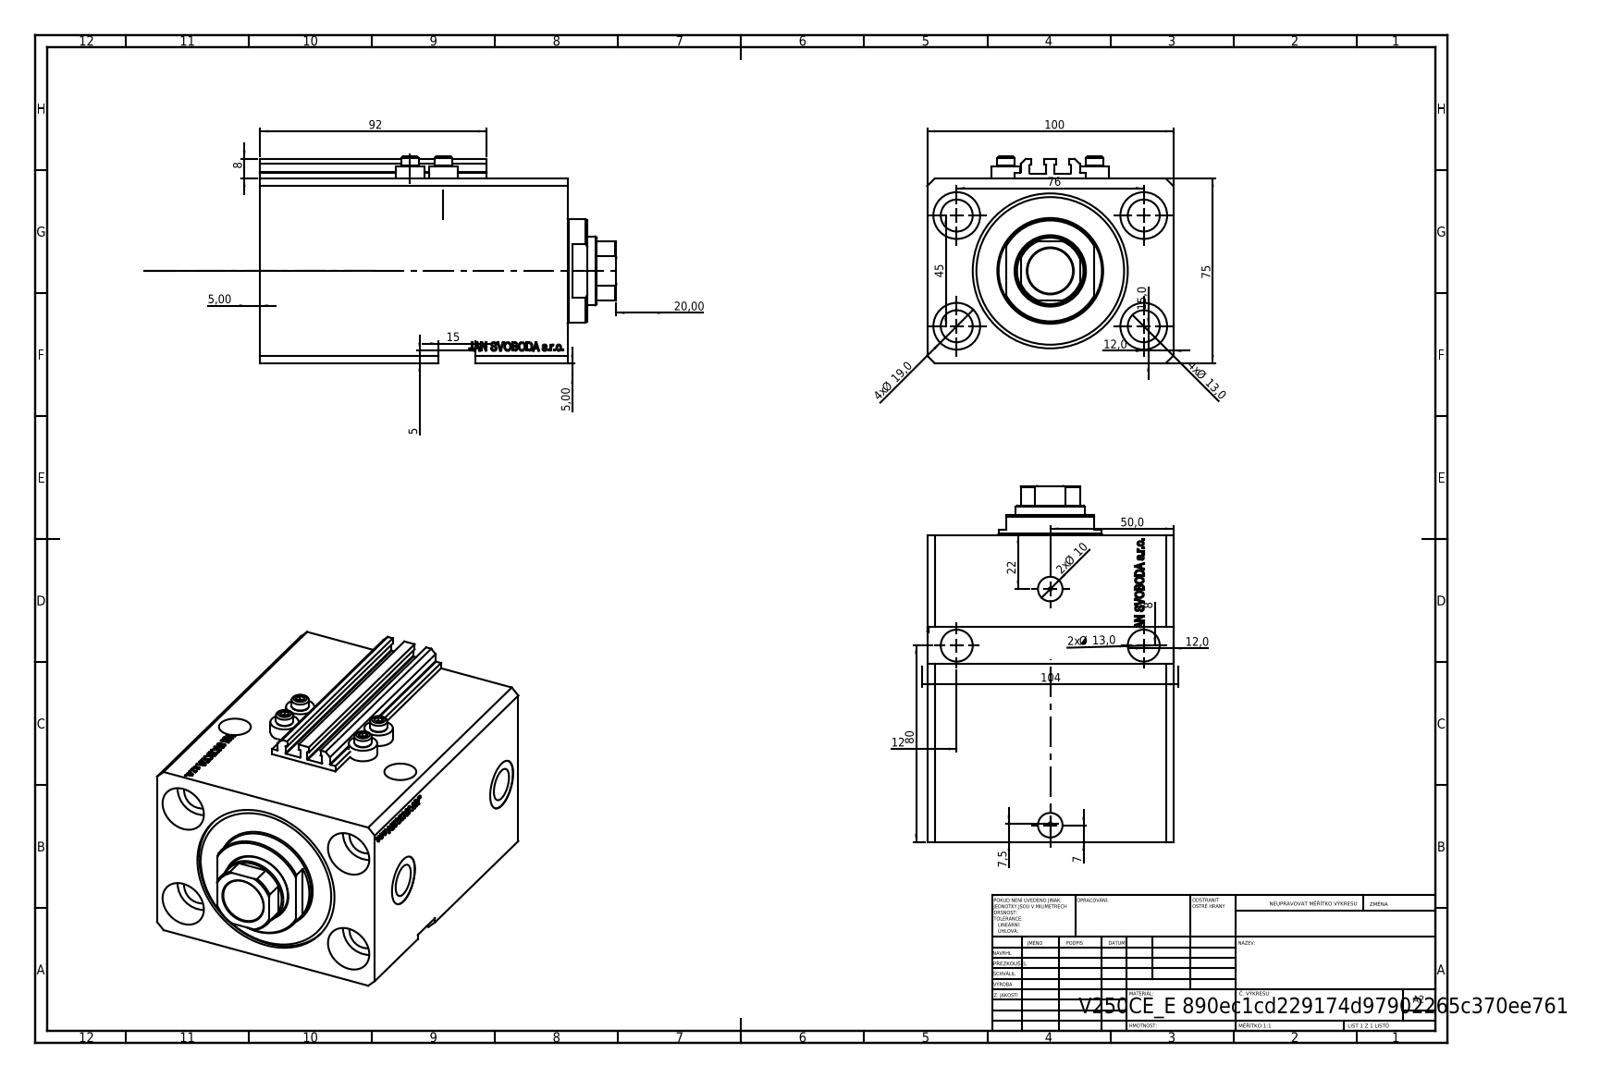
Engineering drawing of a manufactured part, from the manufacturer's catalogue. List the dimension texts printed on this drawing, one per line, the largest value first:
104
100
92
80
76
75
50,0
45
22
20,00
4x Ø 19,0
15,0
15
4x Ø 13,0
2x Ø 13,0
12,0
12,0
12
2x Ø 10
8
8
7,5
7
5,00
5,00
5
